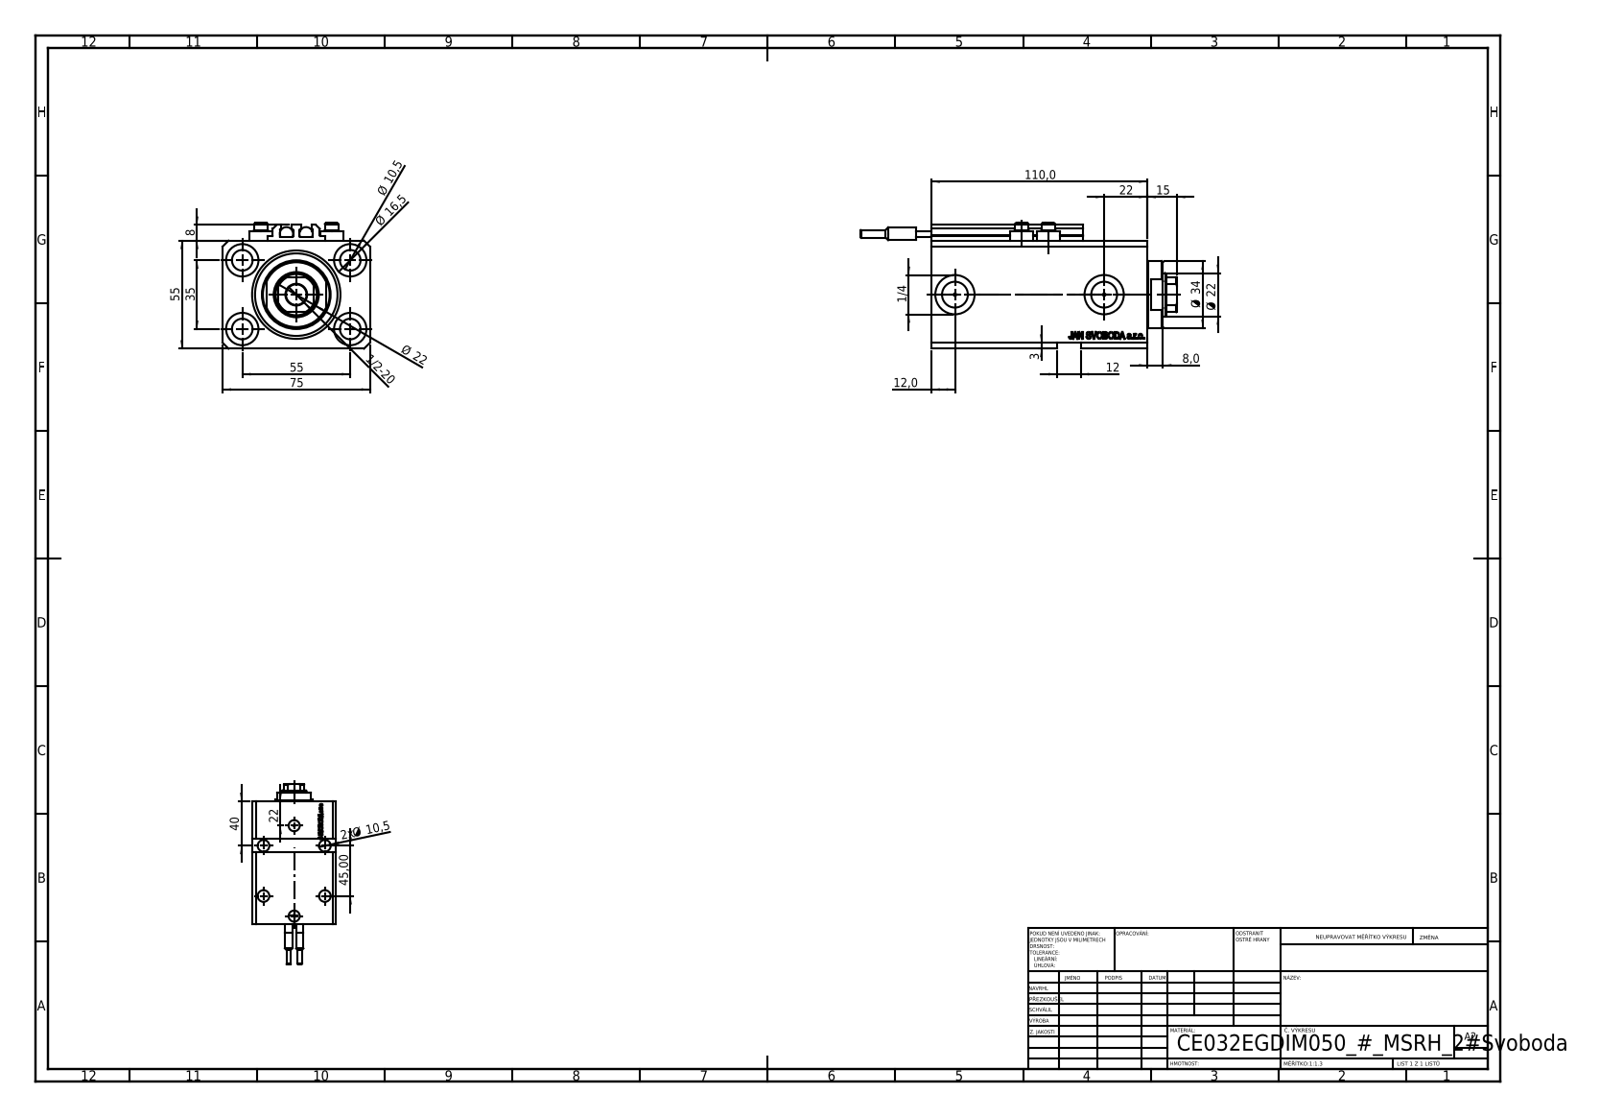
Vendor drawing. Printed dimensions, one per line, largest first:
110,0
75
55
55
45,00
40
35
Ø 34
Ø 22
22
Ø 22
22
Ø 16,5
15
12,0
12
Ø 10,5
2x Ø 10,5
8
8,0
3
1/2-20
1/4
